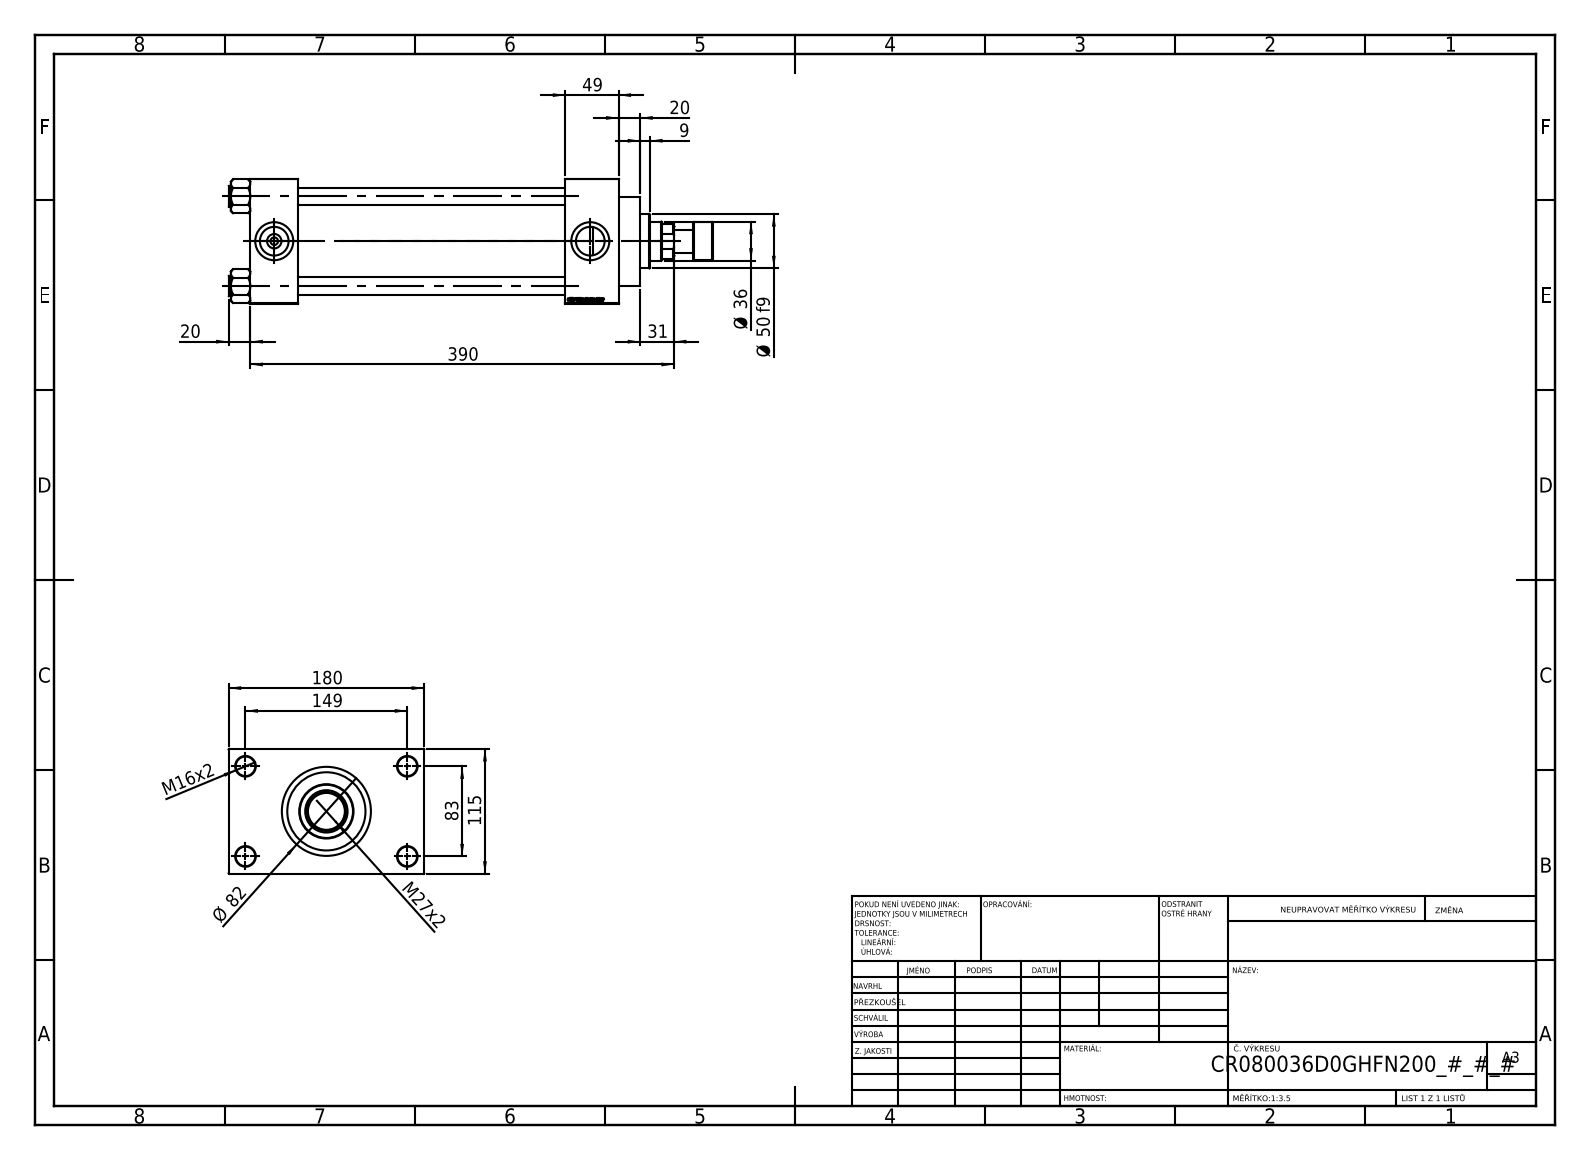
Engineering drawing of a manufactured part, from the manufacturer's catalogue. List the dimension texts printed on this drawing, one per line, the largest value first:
390
180
149
115
83
Ø 82
Ø 50 f9
49
Ø 36
31
M27x2
20
20
M16x2
9
